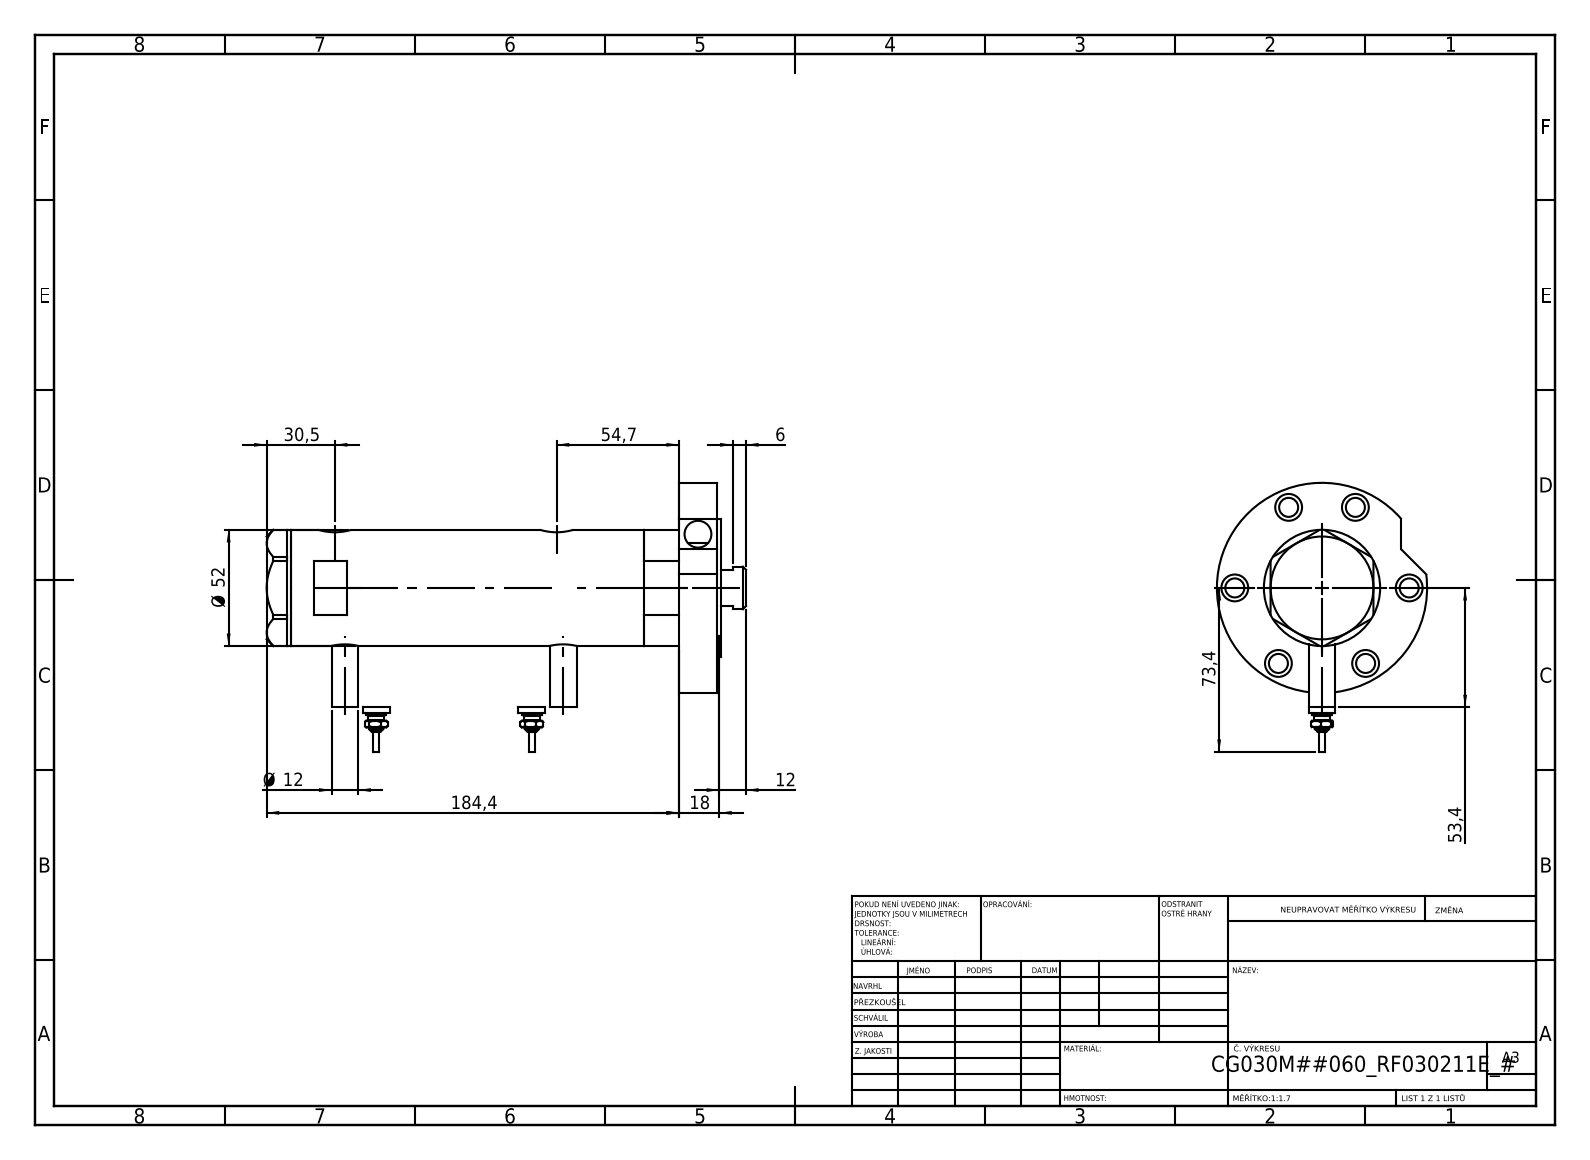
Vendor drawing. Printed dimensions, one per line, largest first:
184,4
73,4
54,7
53,4
Ø 52
30,5
18
12
Ø 12
6
